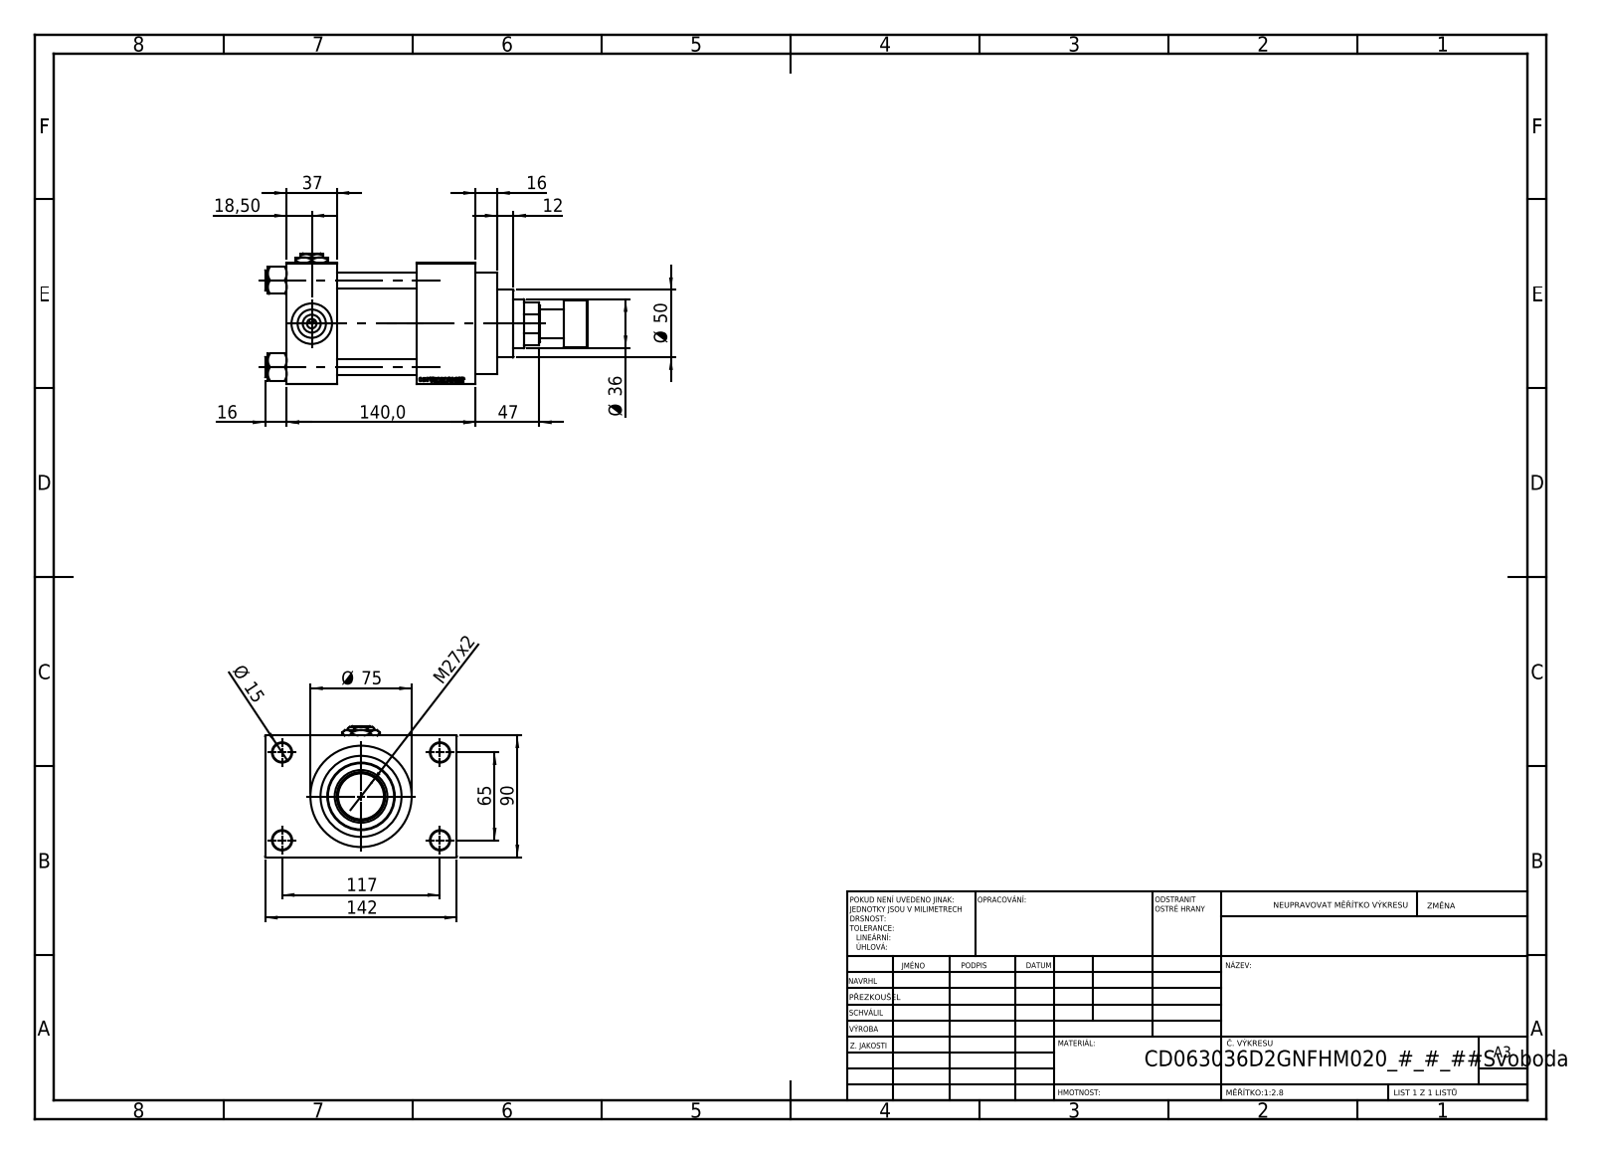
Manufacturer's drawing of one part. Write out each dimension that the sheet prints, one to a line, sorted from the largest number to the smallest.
142
140,0
117
90
Ø 75
65
Ø 50
47
37
Ø 36
M27x2
18,50
16
16
Ø 15
12
